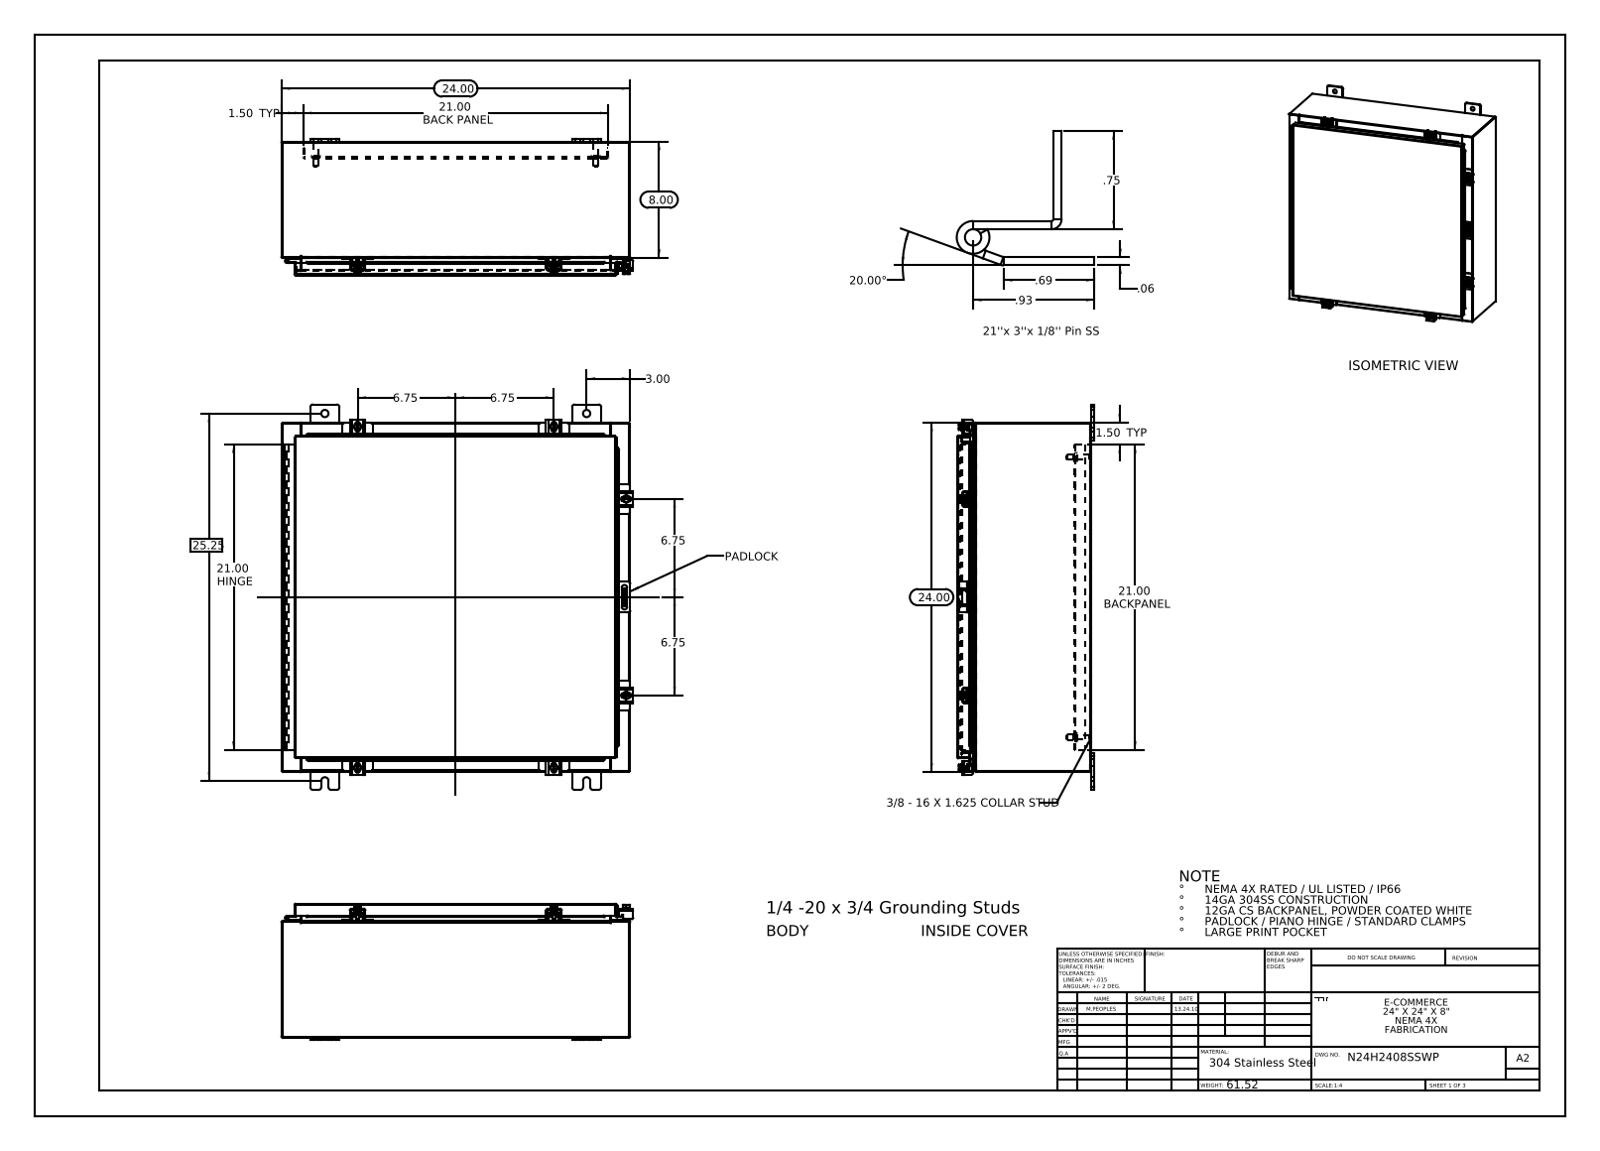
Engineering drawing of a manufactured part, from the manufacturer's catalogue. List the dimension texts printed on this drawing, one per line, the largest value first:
25.25
24.00
24.00
21.00 HINGE
21.00 BACK PANEL
21.00 BACKPANEL
20.00°
8.00
6.75
6.75
6.75
6.75
3.00
1.50 TYP
1.50 TYP
.93
.75
.69
.06
